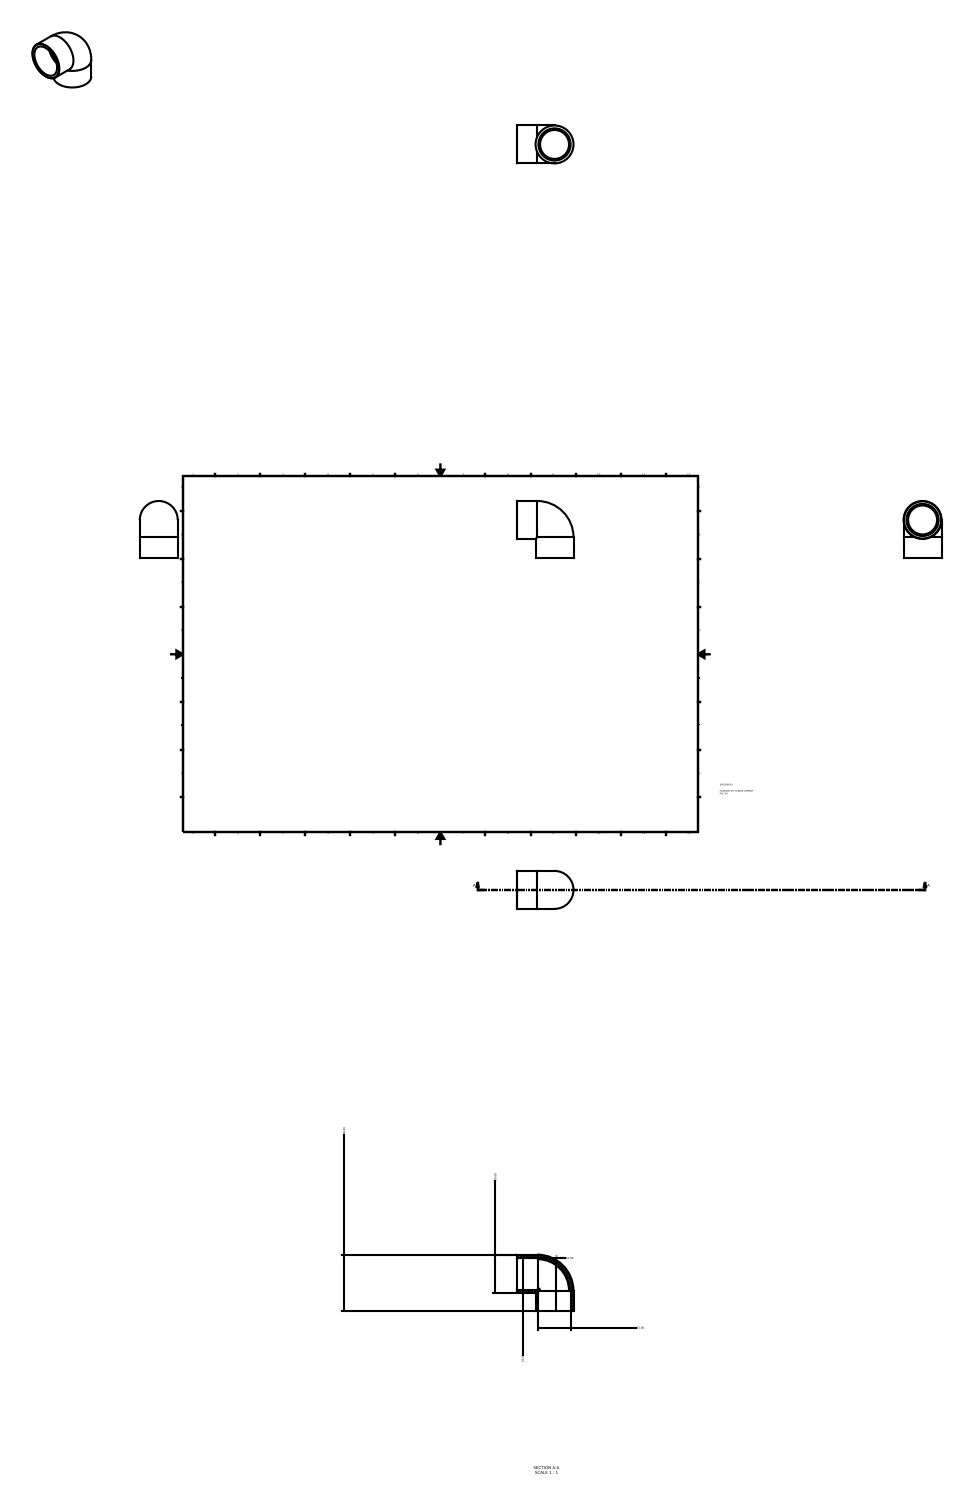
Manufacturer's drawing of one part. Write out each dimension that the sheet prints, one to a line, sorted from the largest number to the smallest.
88.00
59.00
50.00
50.00
32.00
32.00
